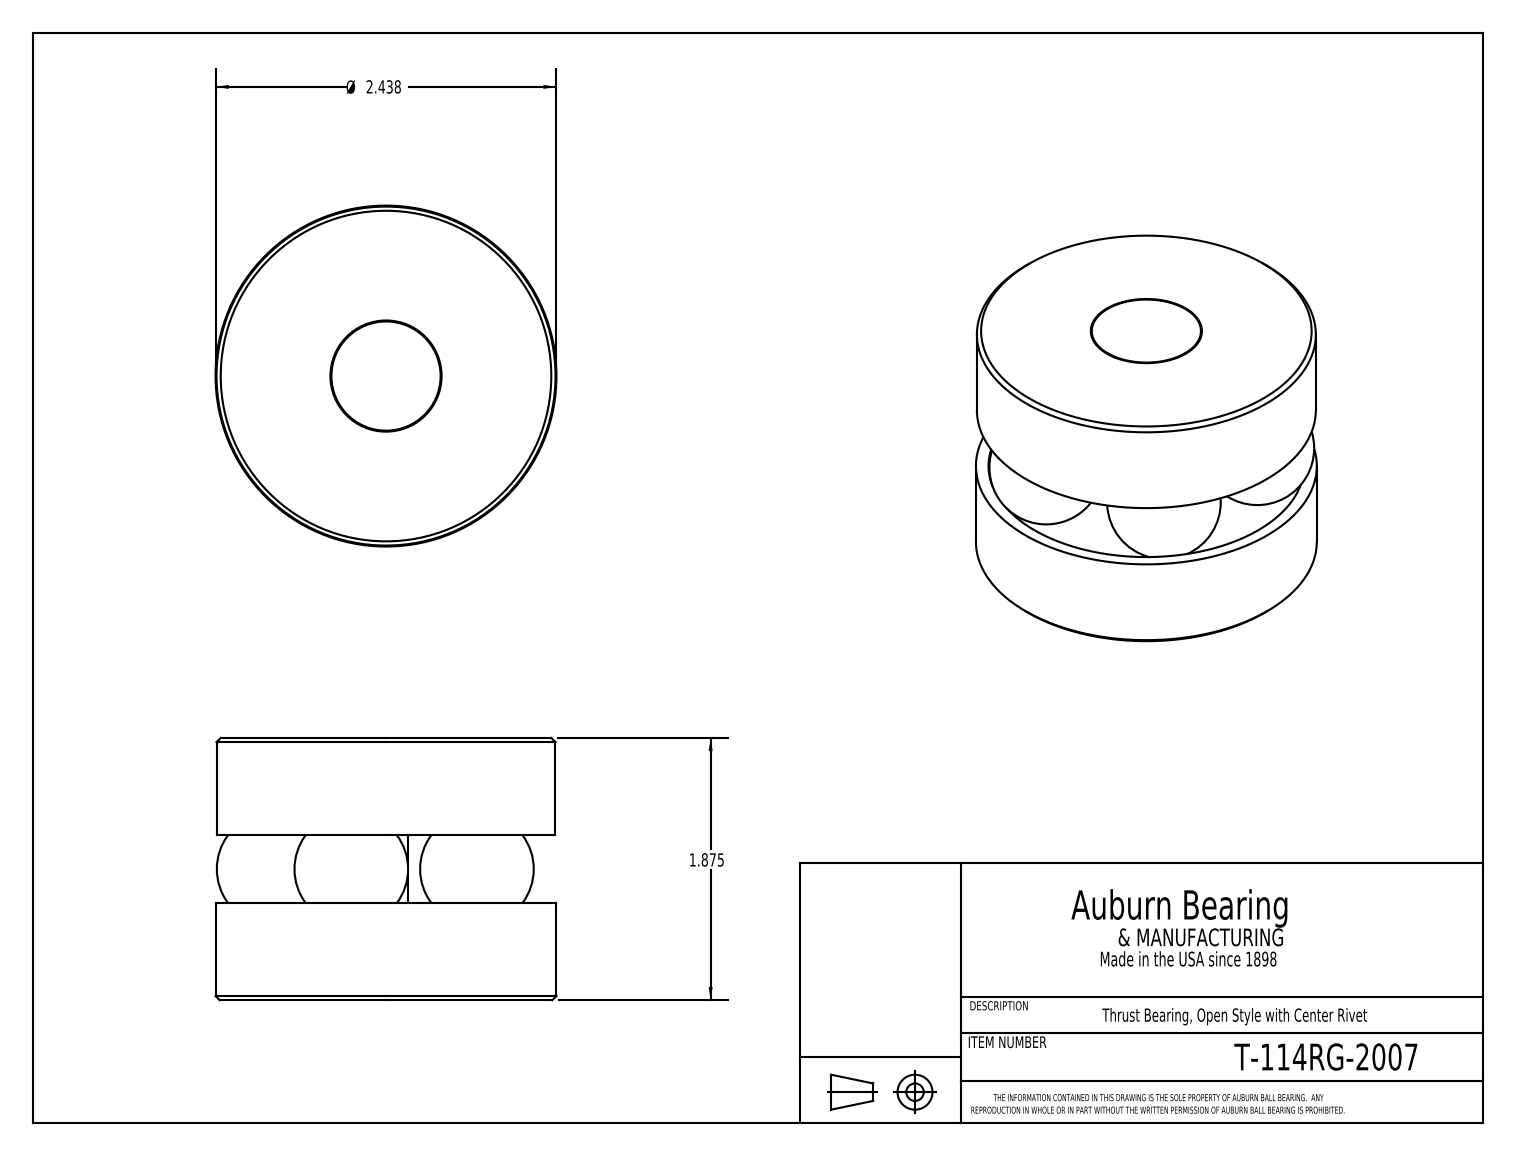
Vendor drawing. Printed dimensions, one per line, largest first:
Ø 2.438
1.875
